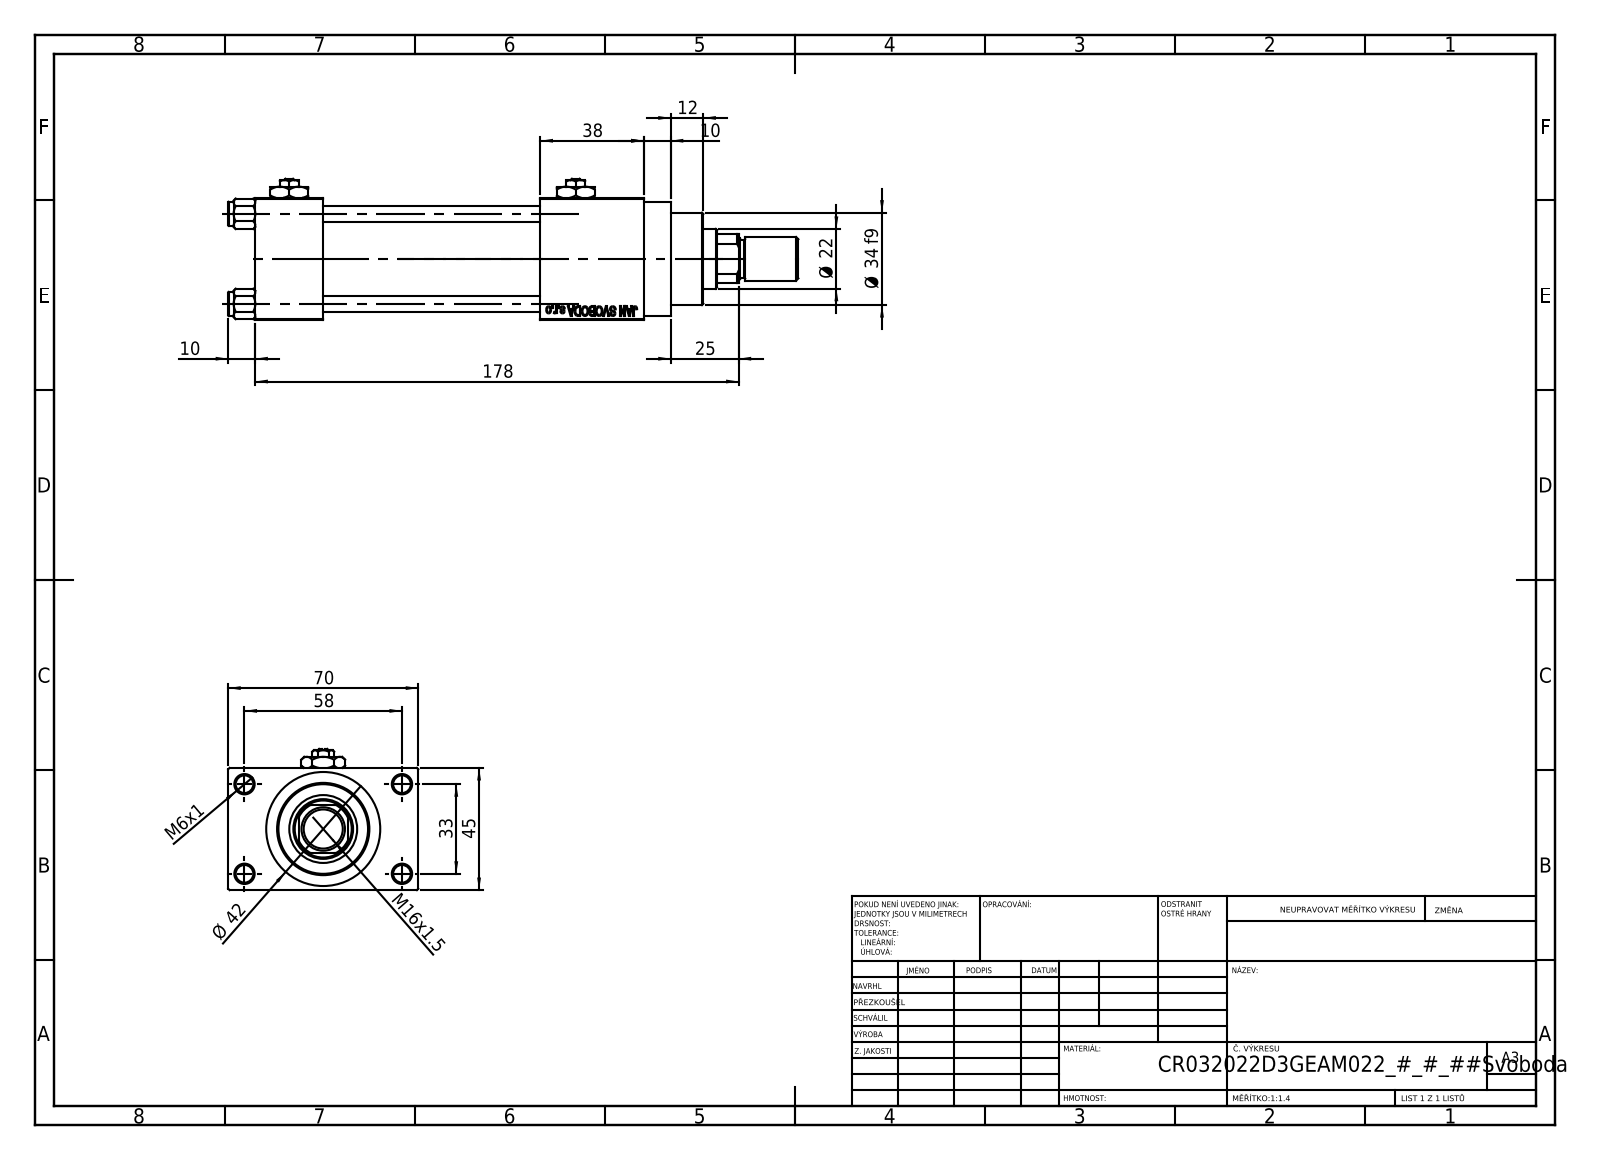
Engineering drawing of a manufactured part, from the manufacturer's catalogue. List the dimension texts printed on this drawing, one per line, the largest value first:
178
70
58
45
Ø 42
38
Ø 34 f9
33
25
Ø 22
M16x1.5
12
10
10
M6x1
